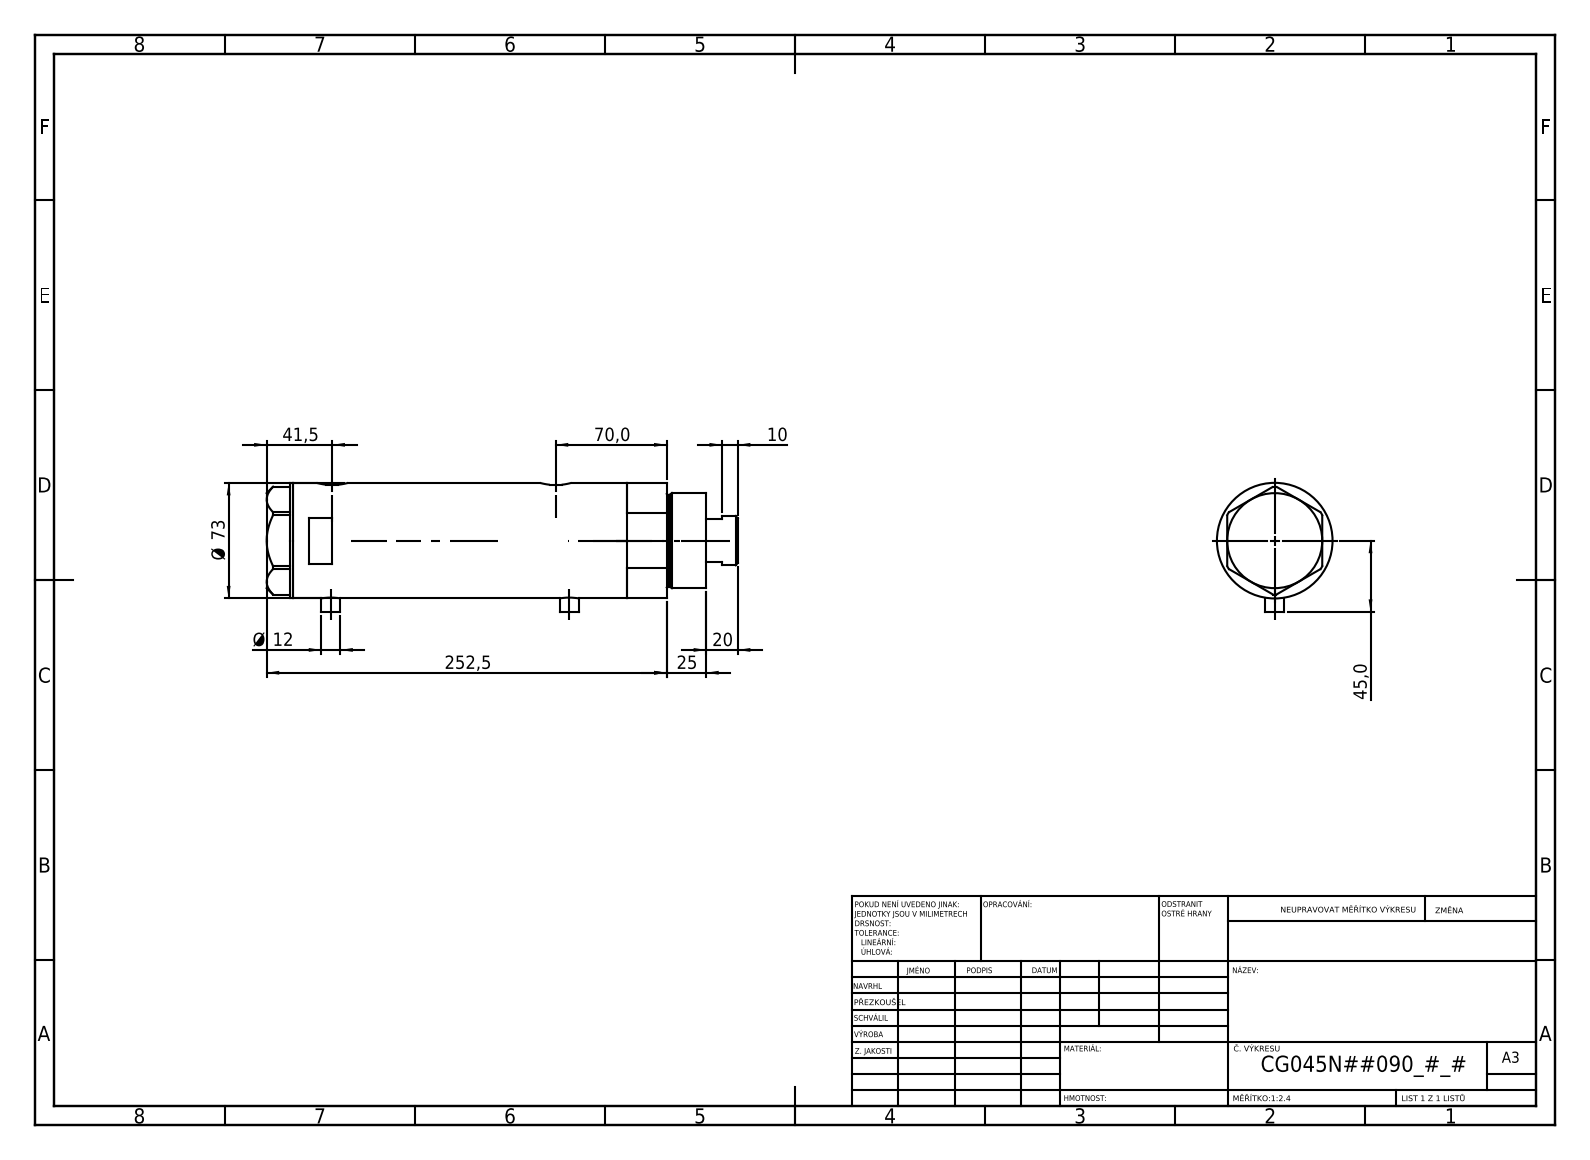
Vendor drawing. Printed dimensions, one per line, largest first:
252,5
Ø 73
70,0
45,0
41,5
25
20
Ø 12
10
